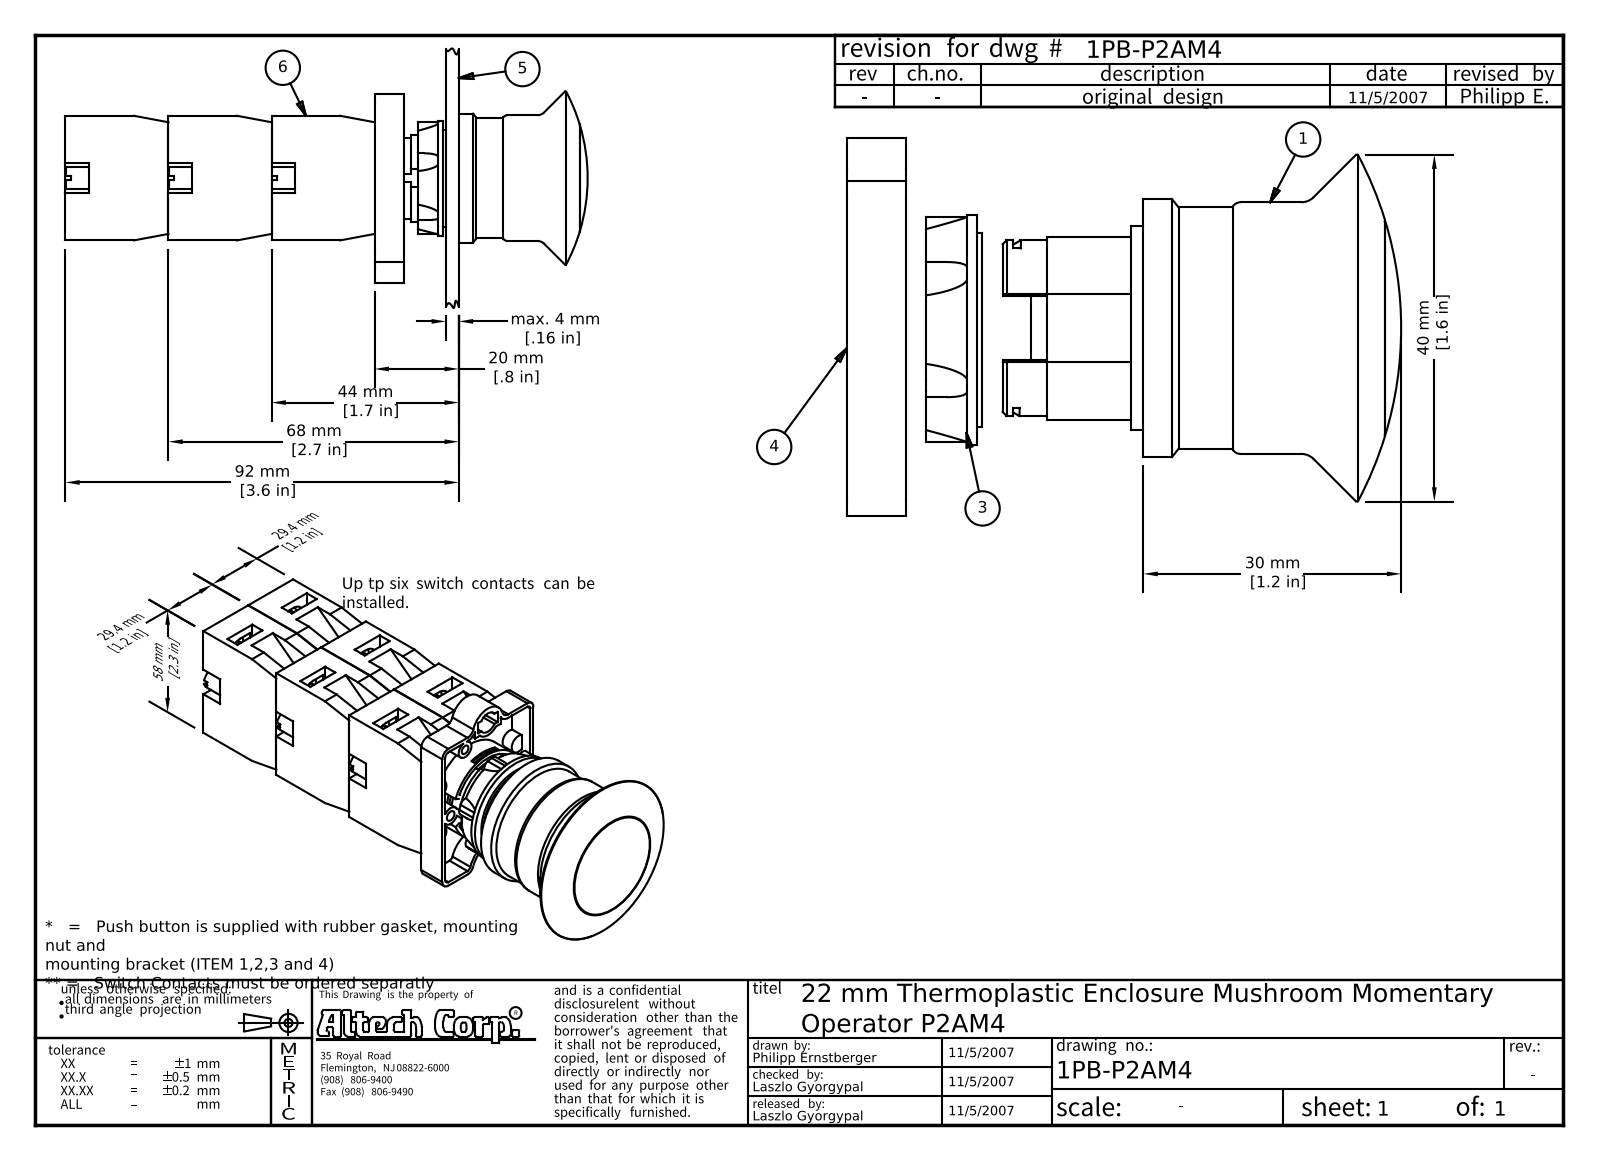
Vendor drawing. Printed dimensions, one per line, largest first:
92 mm [3.6 in]
68 mm [2.7 in]
58 mm [2.3 in]
44 mm [1.7 in]
40 mm [1.6 in]
30 mm [1.2 in]
29.4 mm [1.2 in]
29.4 mm [1.2 in]
20 mm [.8 in]
max. 4 mm [.16 in]
